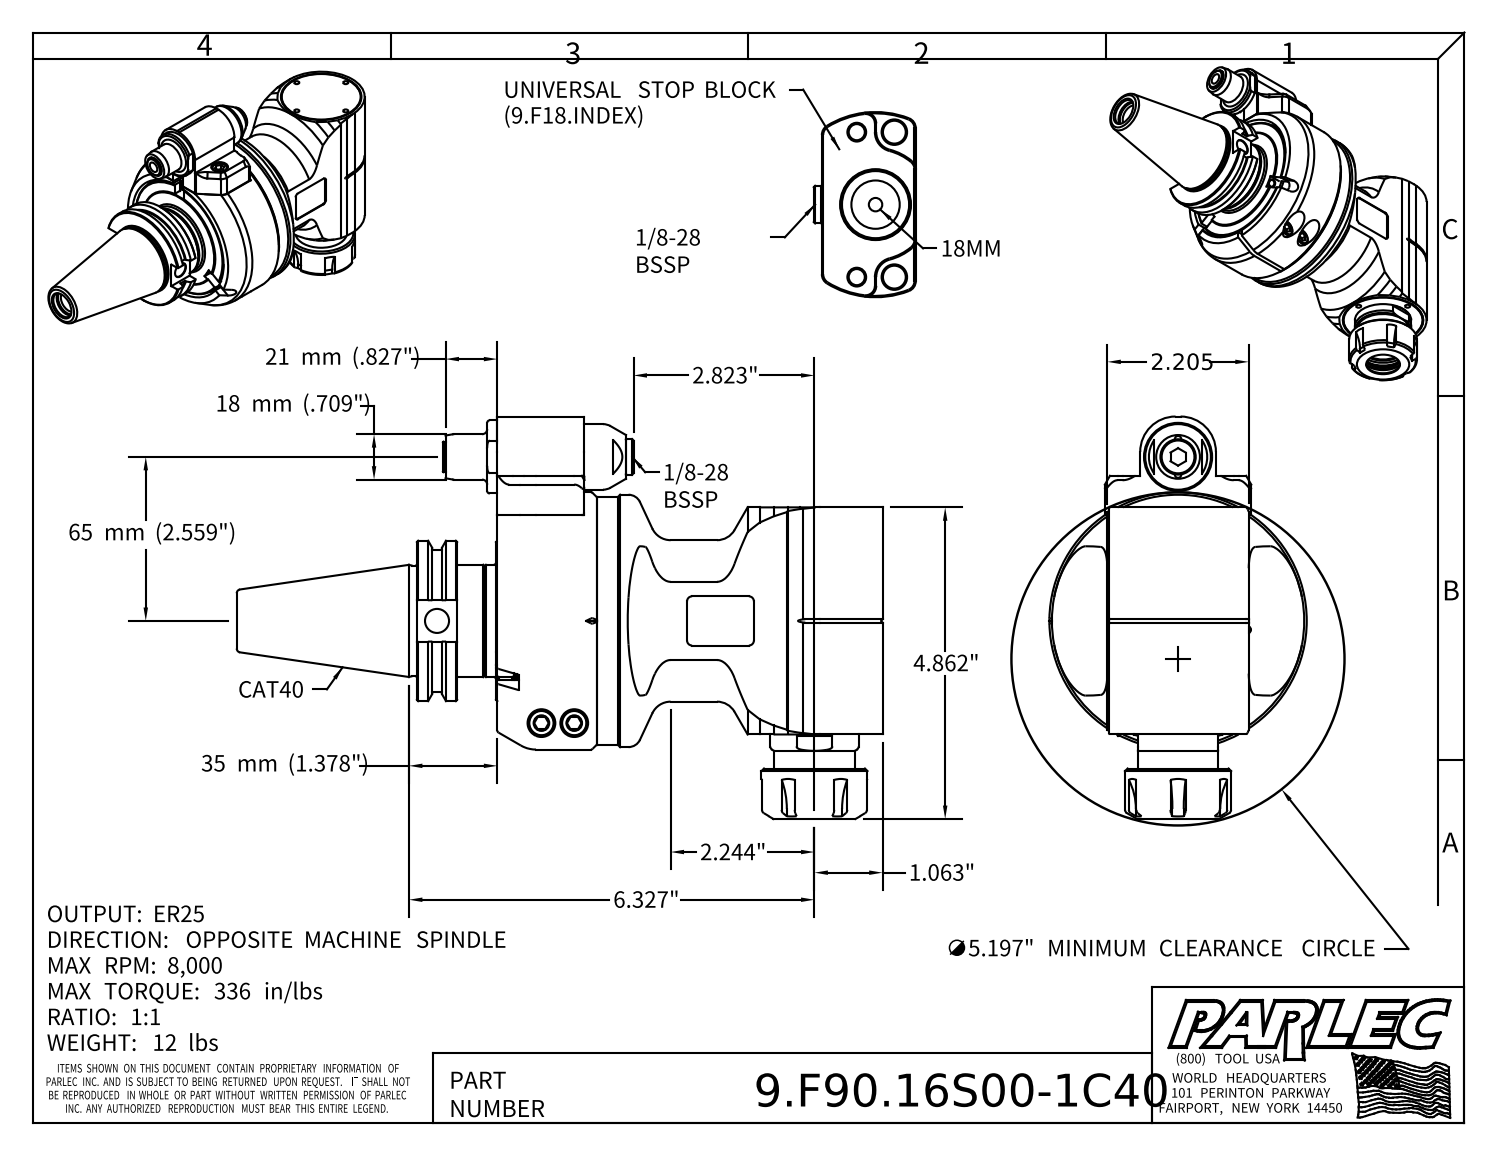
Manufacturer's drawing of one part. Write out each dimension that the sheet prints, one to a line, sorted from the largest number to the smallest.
65 mm (2.559")
35 mm (1.378")
21 mm (.827")
18 mm (.709")
6.327"
∅5.197" MINIMUM CLEARANCE CIRCLE
4.862"
2.823"
2.244"
2.205
1.063"
